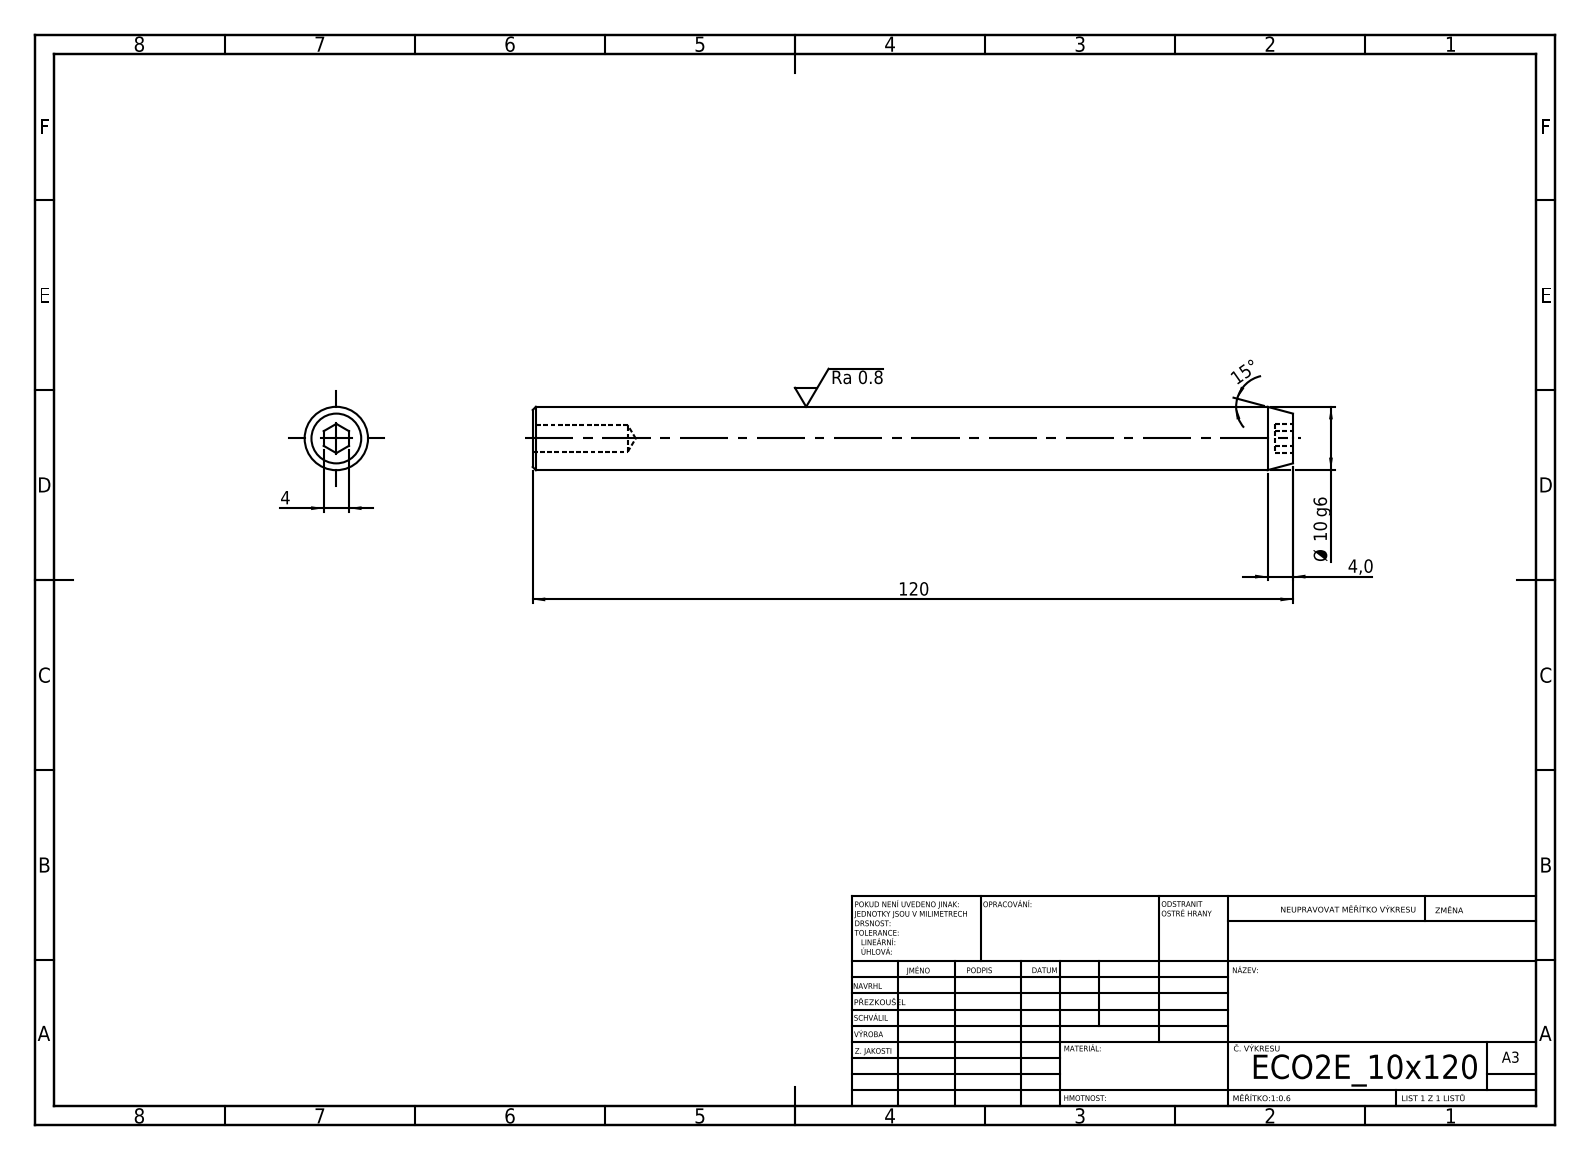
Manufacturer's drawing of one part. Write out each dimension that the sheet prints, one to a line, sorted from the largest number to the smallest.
120
15°
Ø 10 g6
4,0
4
